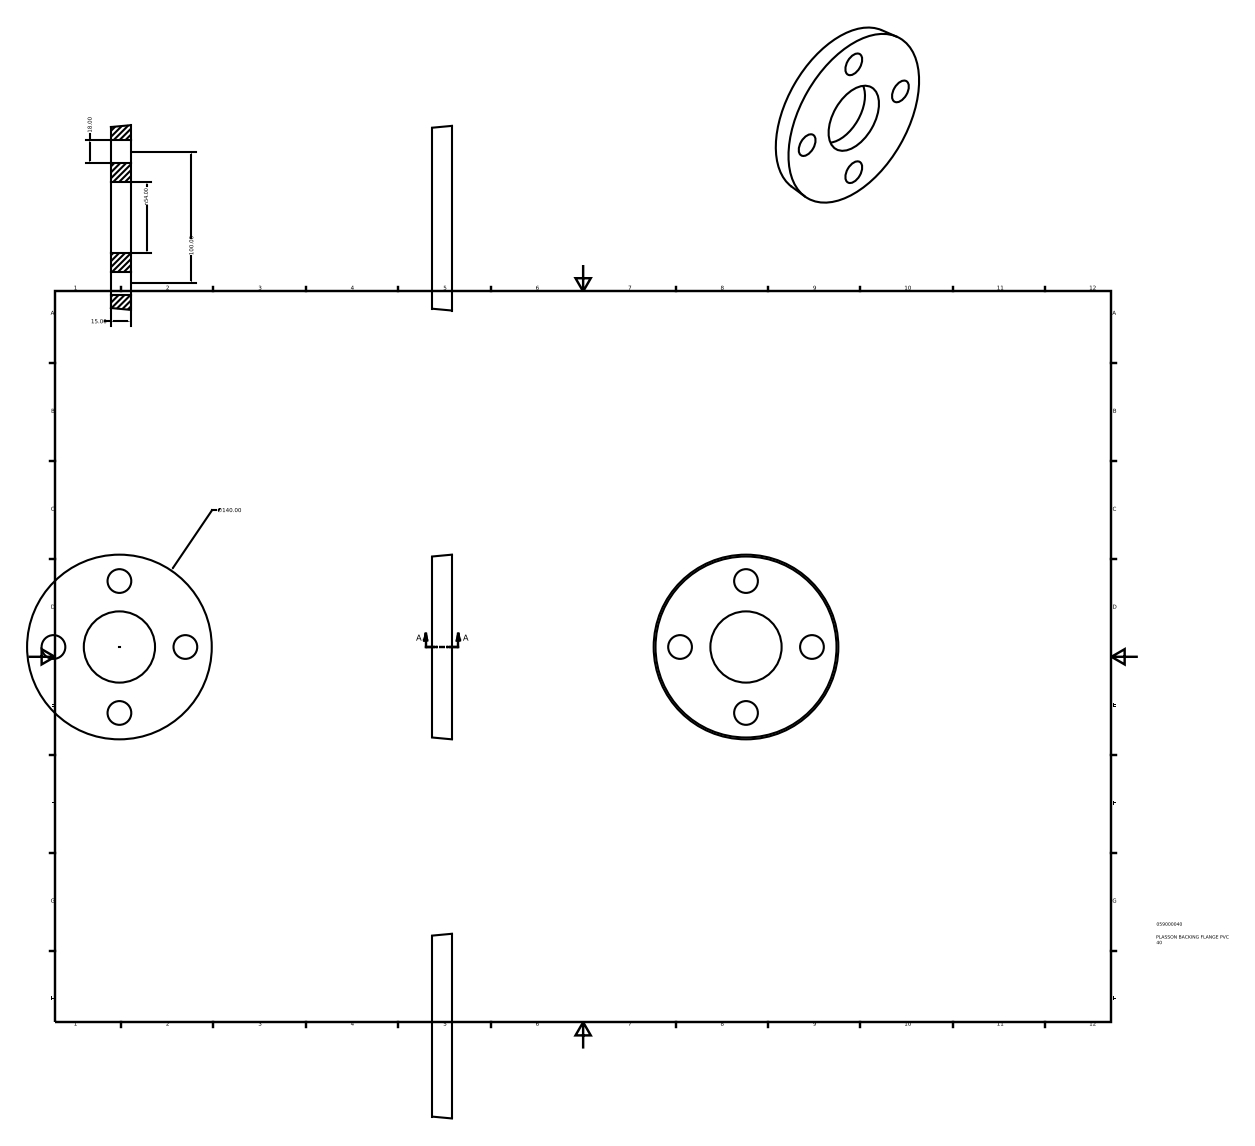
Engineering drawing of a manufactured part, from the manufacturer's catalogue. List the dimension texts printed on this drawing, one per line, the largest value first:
∅140.00
100.00
n54.00
18.00
15.00
